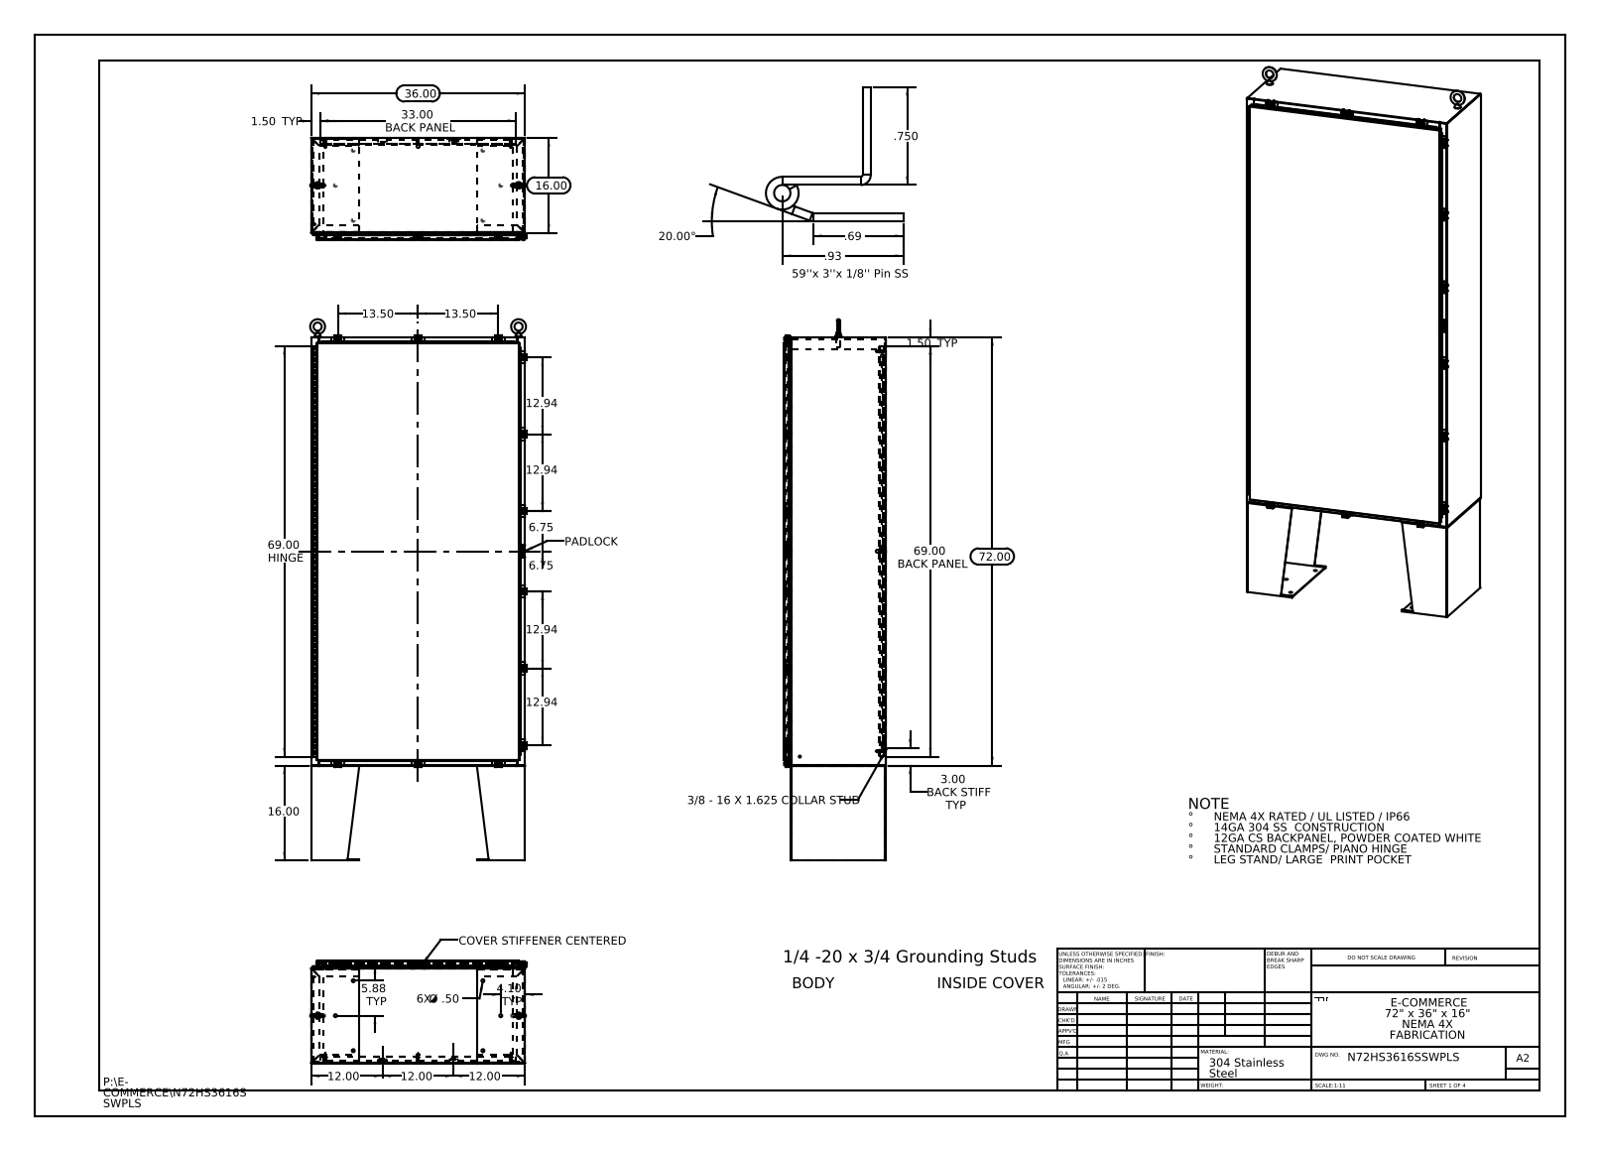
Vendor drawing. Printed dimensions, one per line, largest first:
72.00
69.00 HINGE
69.00 BACK PANEL
36.00
33.00 BACK PANEL
20.00°
16.00
16.00
13.50
13.50
12.94
12.94
12.94
12.94
12.00
12.00
12.00
6.75
6.75
5.88 TYP
4.10 TYP
3.00 BACK STIFF TYP
1.50 TYP
1.50 TYP
.93
.750
.69
6X Ø .50
